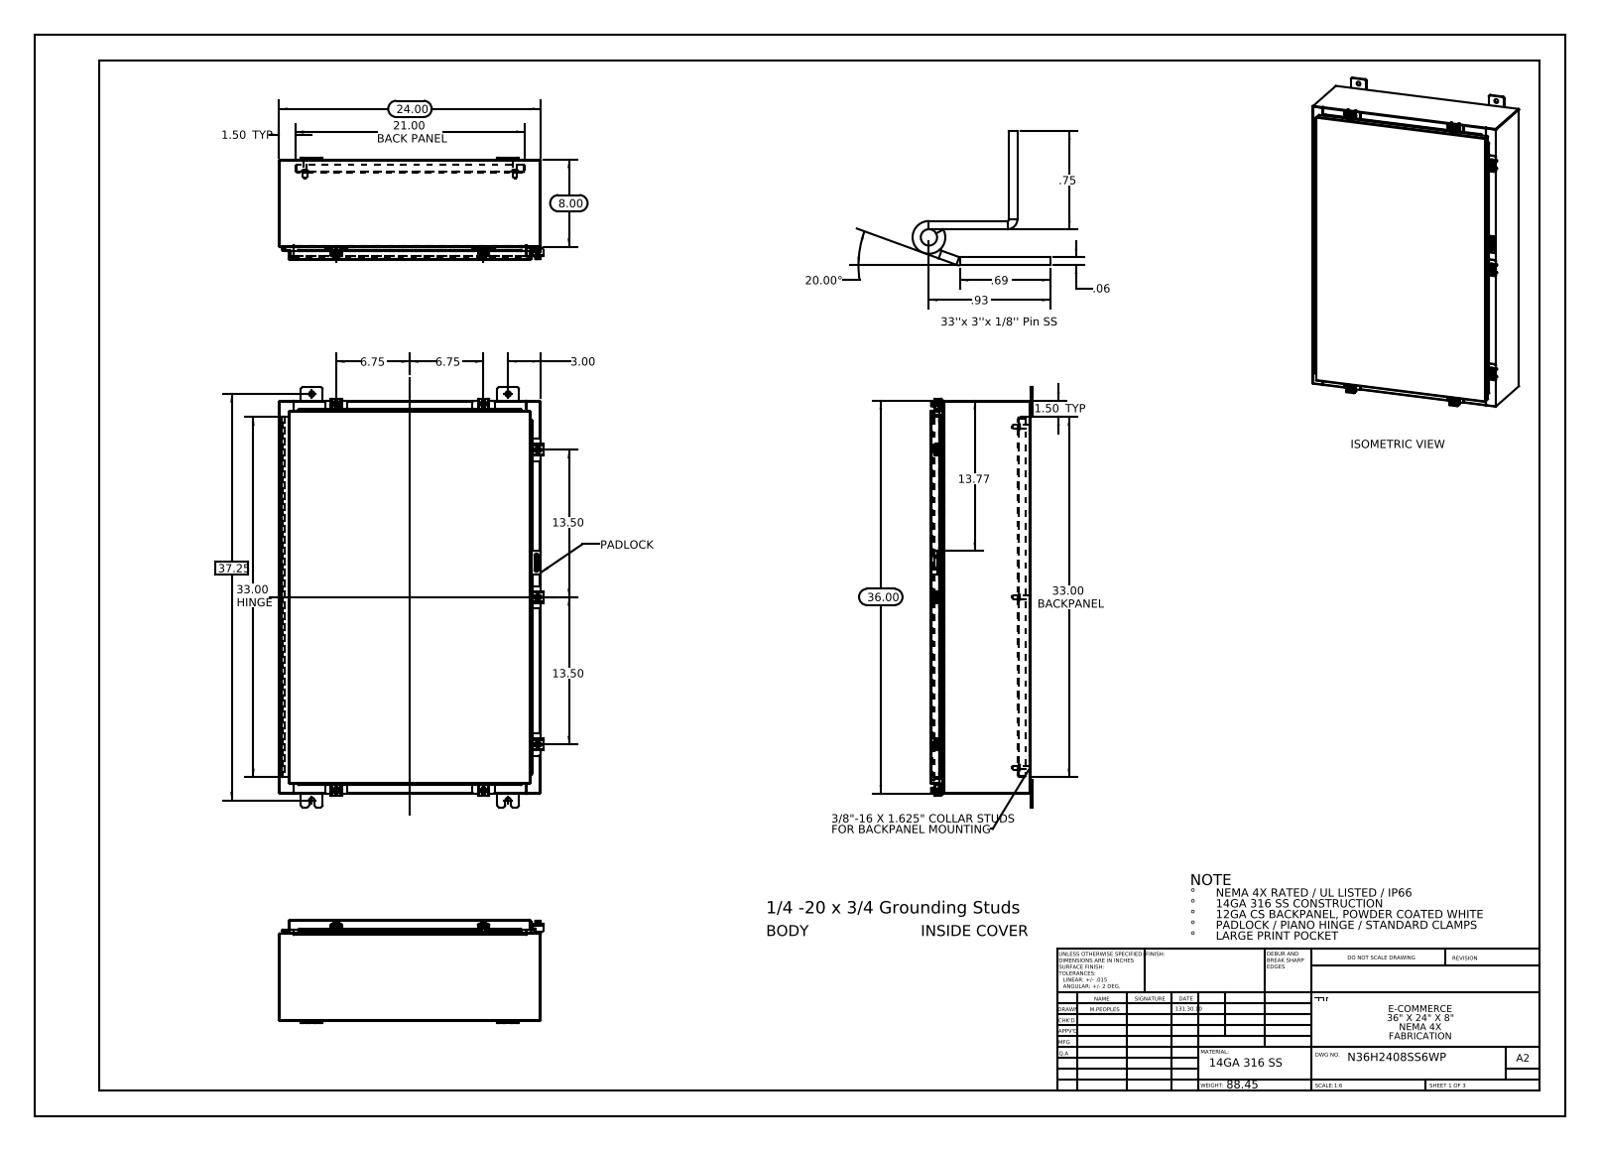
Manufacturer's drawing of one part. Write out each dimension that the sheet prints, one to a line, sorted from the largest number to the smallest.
37.25
36.00
33.00 HINGE
33.00 BACKPANEL
24.00
21.00 BACK PANEL
20.00°
13.77
13.50
13.50
8.00
6.75
6.75
3.00
1.50 TYP
1.50 TYP
.93
.75
.69
.06
